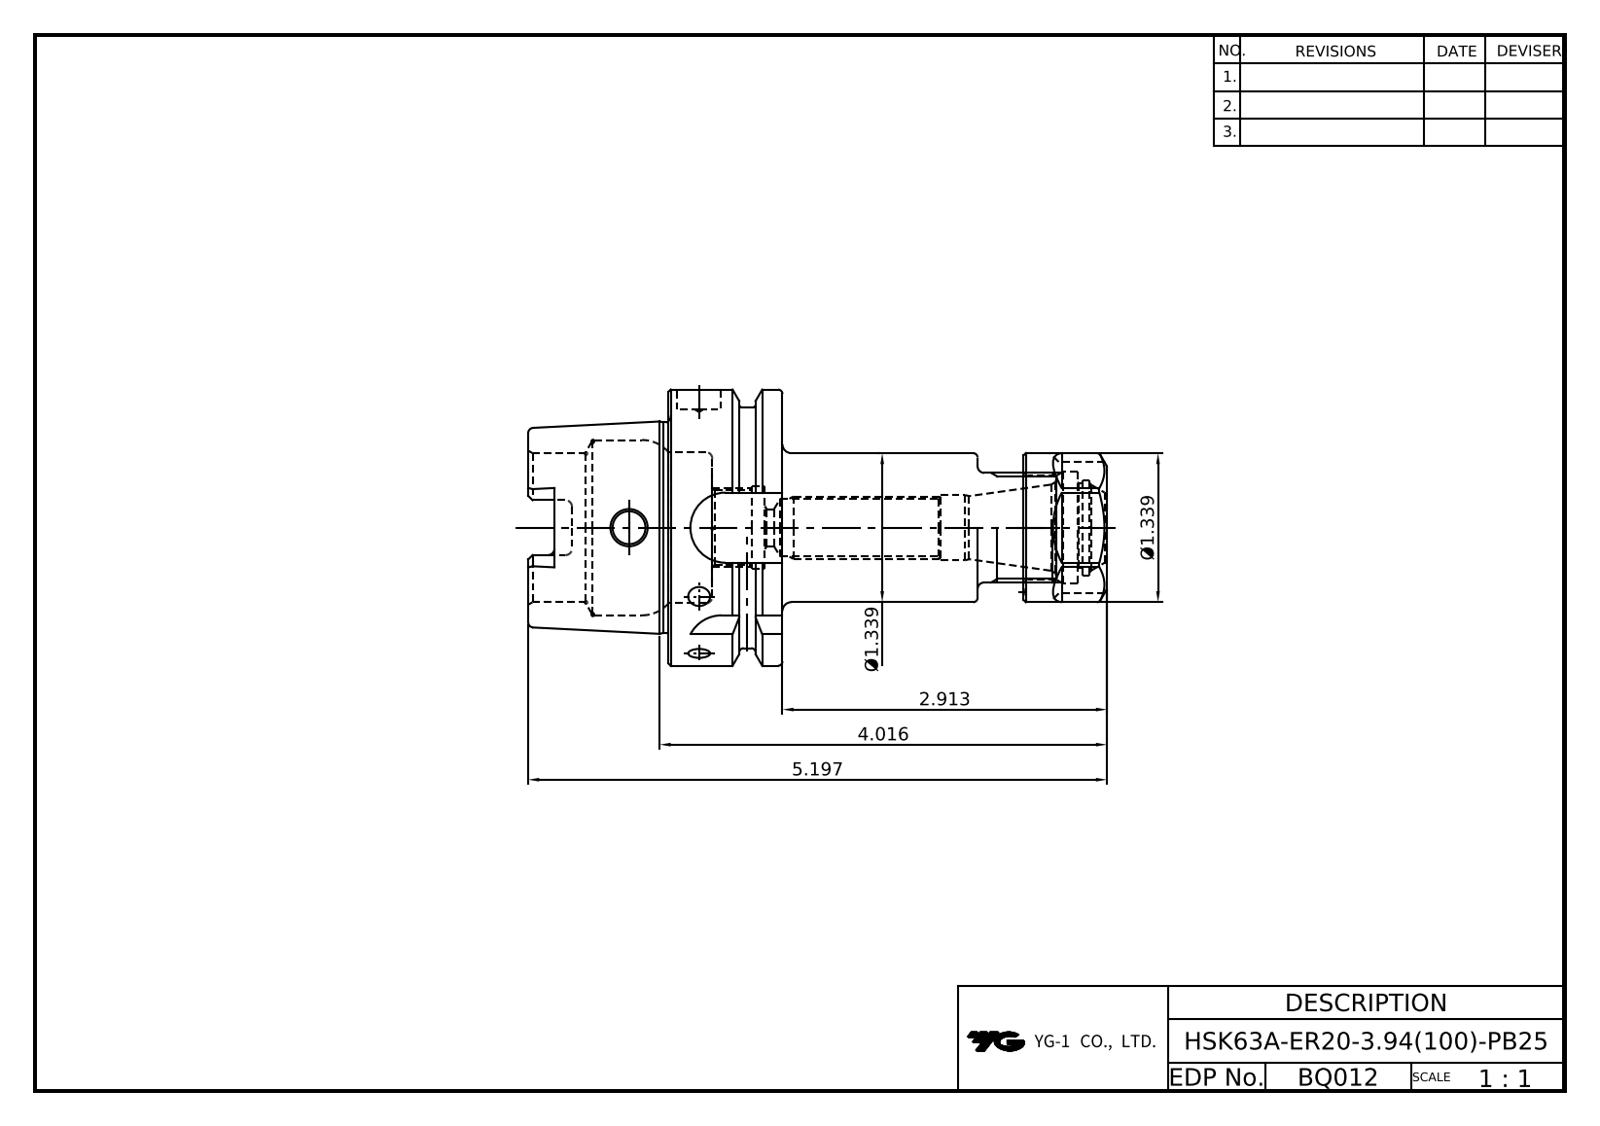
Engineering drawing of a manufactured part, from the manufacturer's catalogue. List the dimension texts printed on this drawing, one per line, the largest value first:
5.197
4.016
2.913
Ø1.339
Ø1.339
